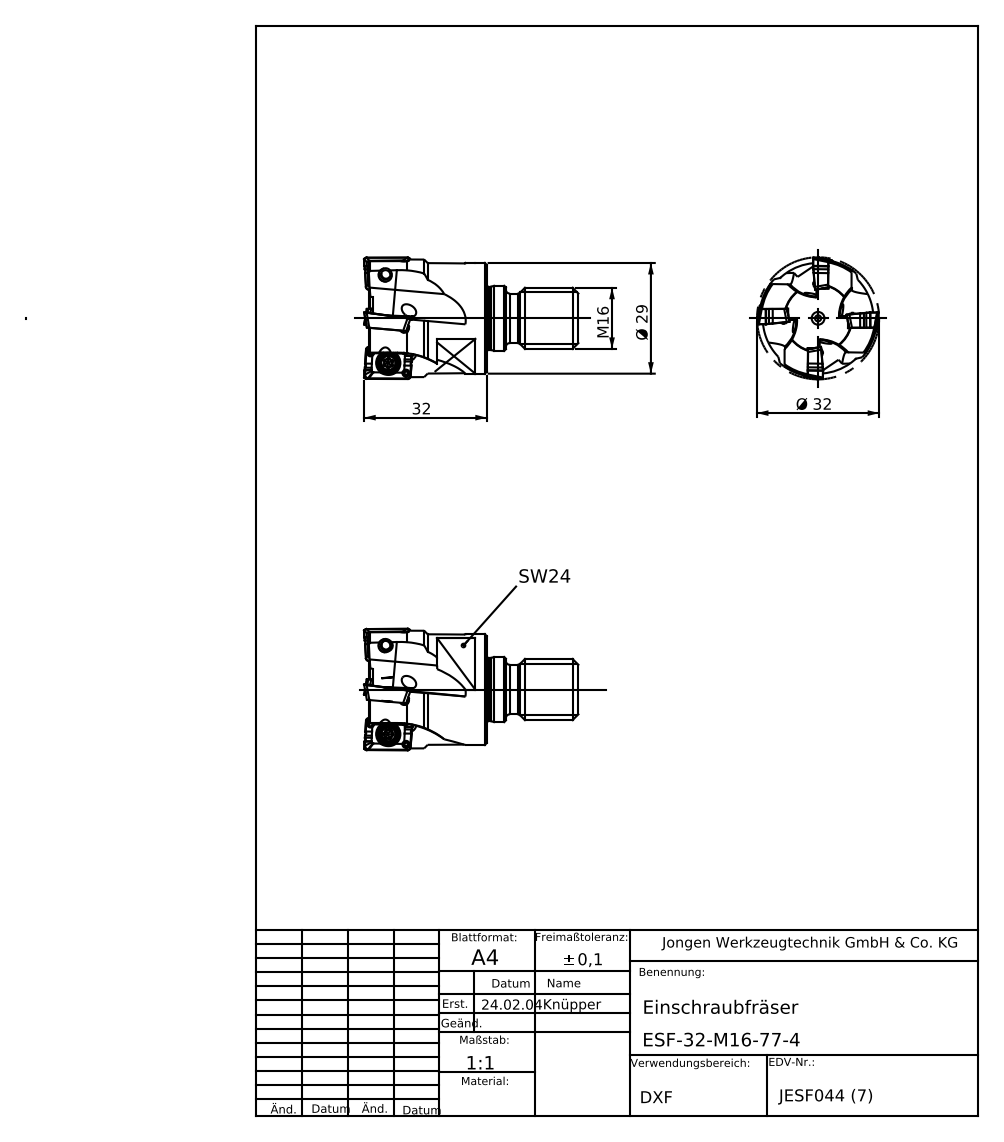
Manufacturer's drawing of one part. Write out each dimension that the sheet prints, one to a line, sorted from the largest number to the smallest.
32
Ø 32
Ø 29
M 16
